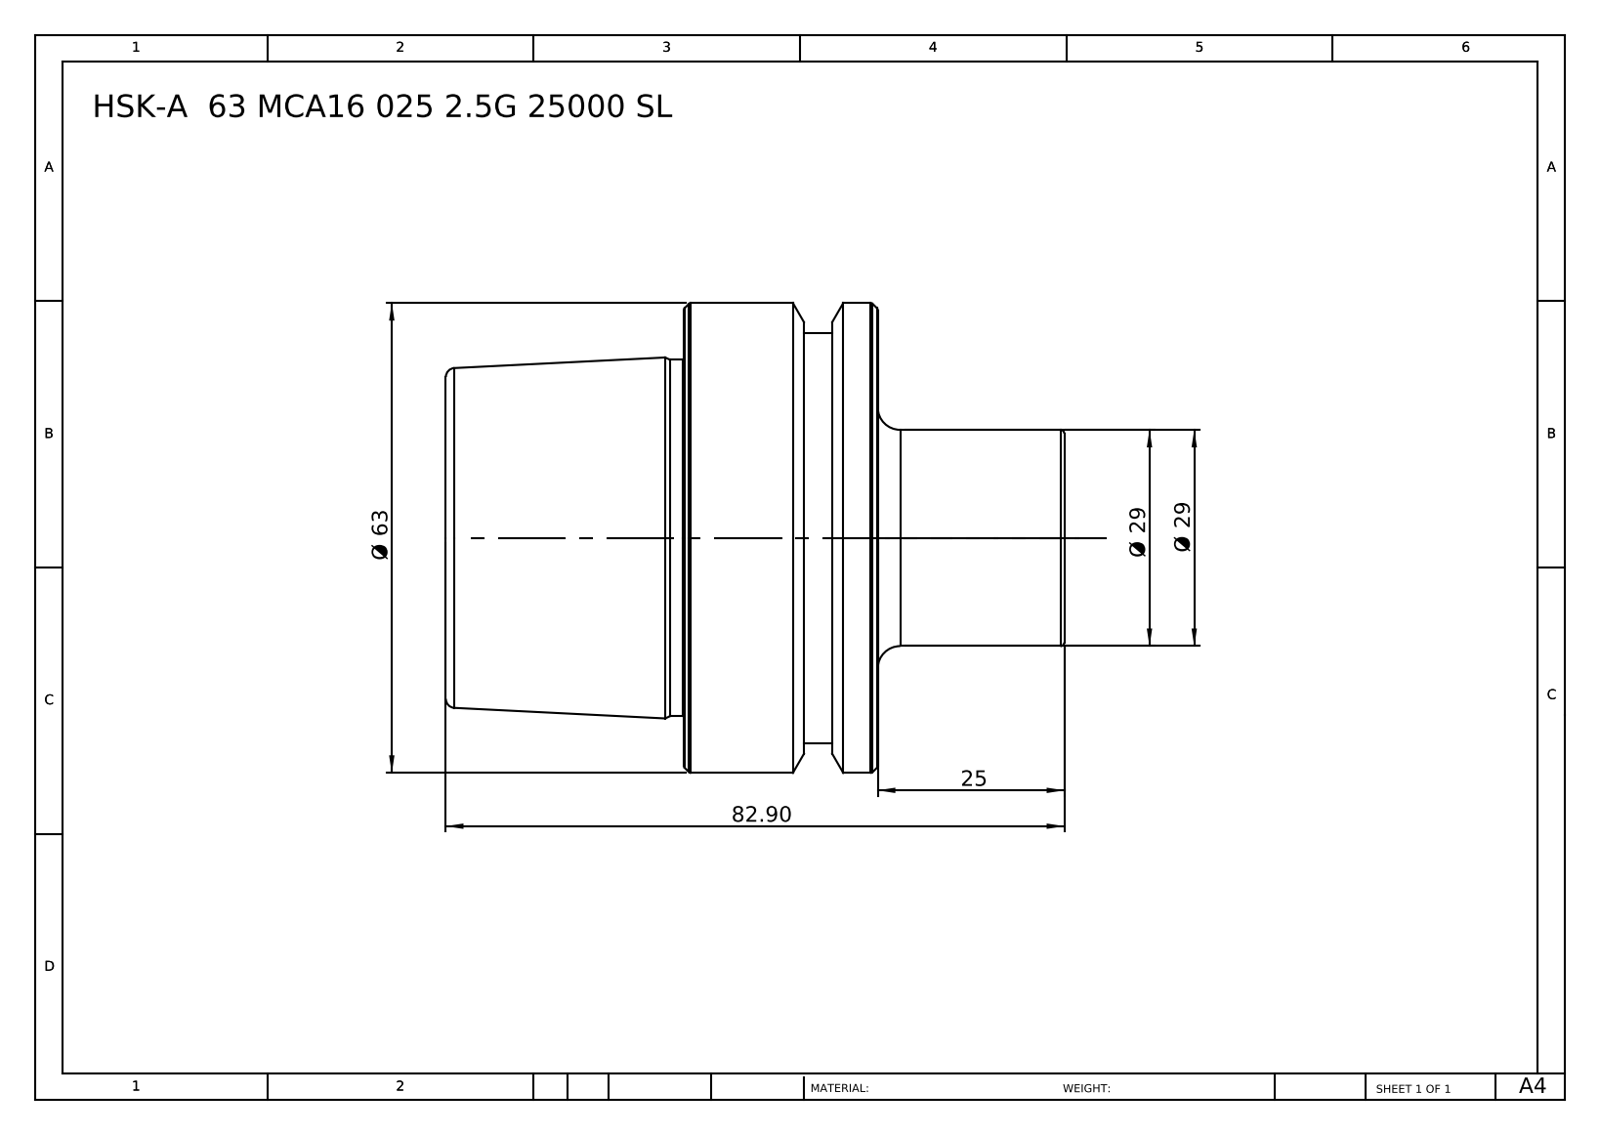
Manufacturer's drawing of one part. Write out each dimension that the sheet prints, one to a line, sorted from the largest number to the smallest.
82.90
Ø 63
Ø 29
Ø 29
25
